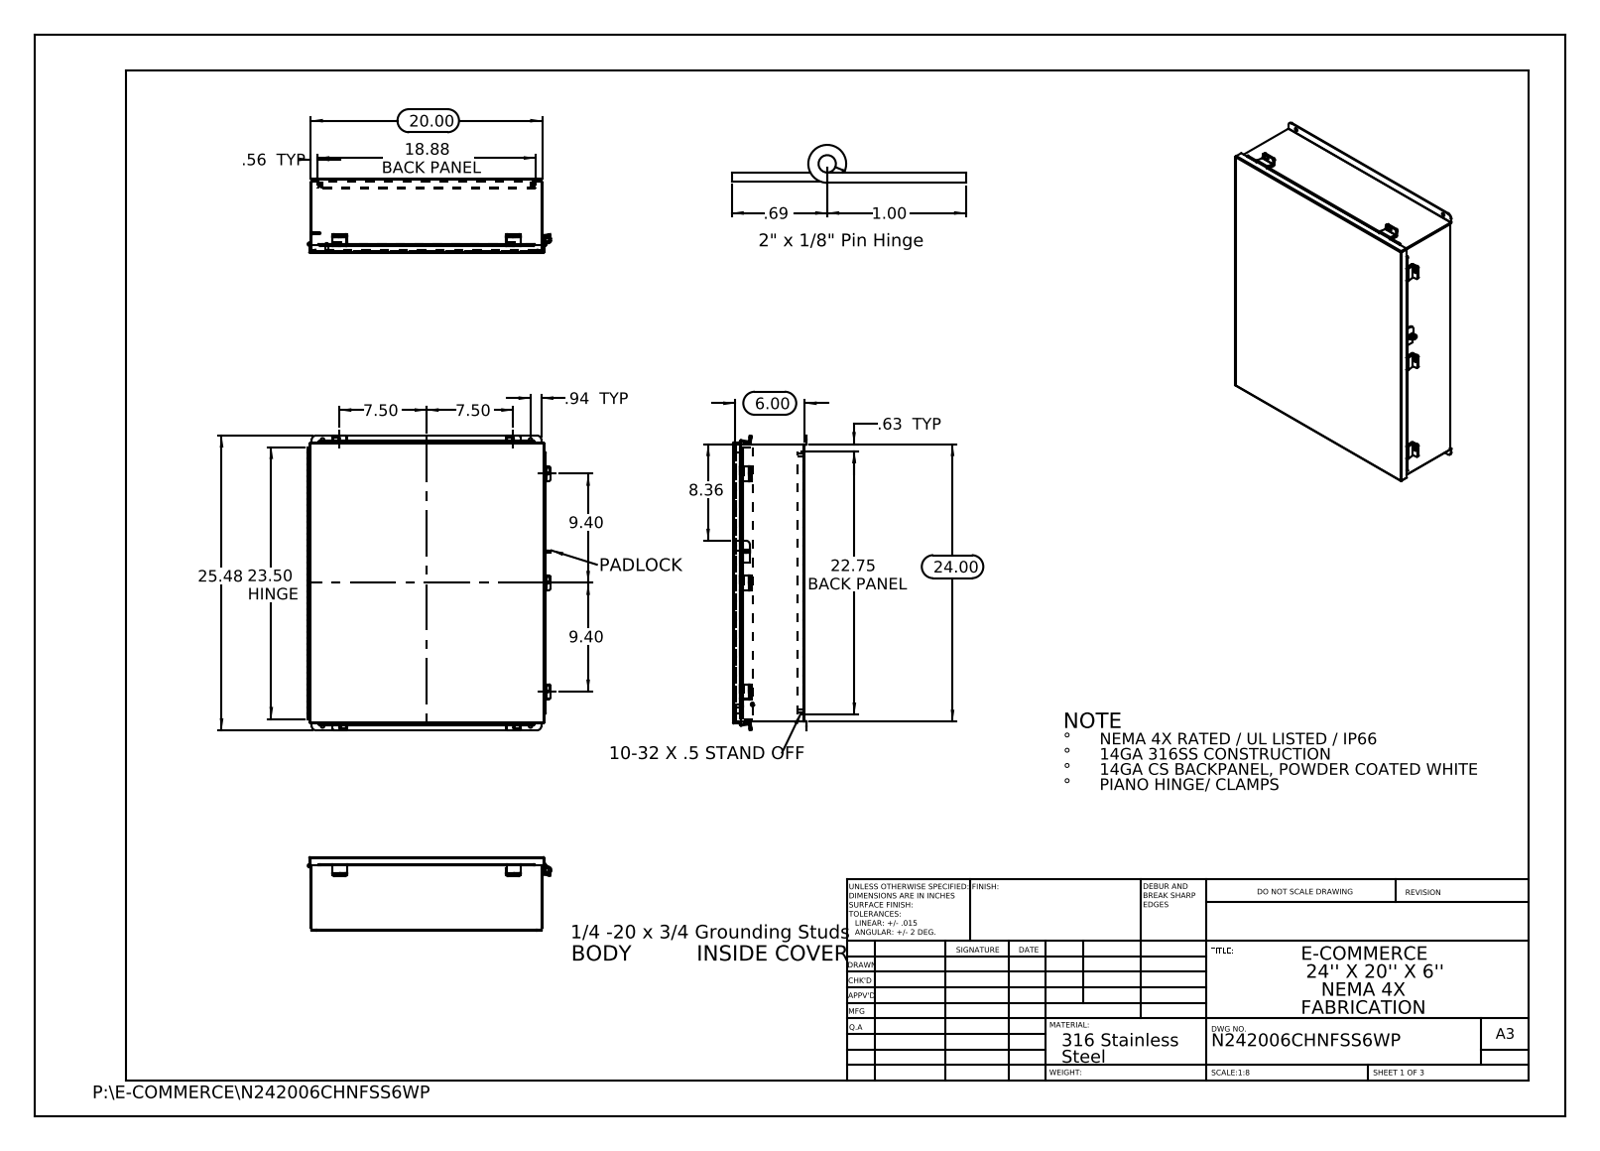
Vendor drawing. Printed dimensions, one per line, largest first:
25.48
24.00
23.50 HINGE
22.75 BACK PANEL
20.00
18.88 BACK PANEL
9.40
9.40
8.36
7.50
7.50
6.00
1.00
.94 TYP
.69
.63 TYP
.56 TYP
